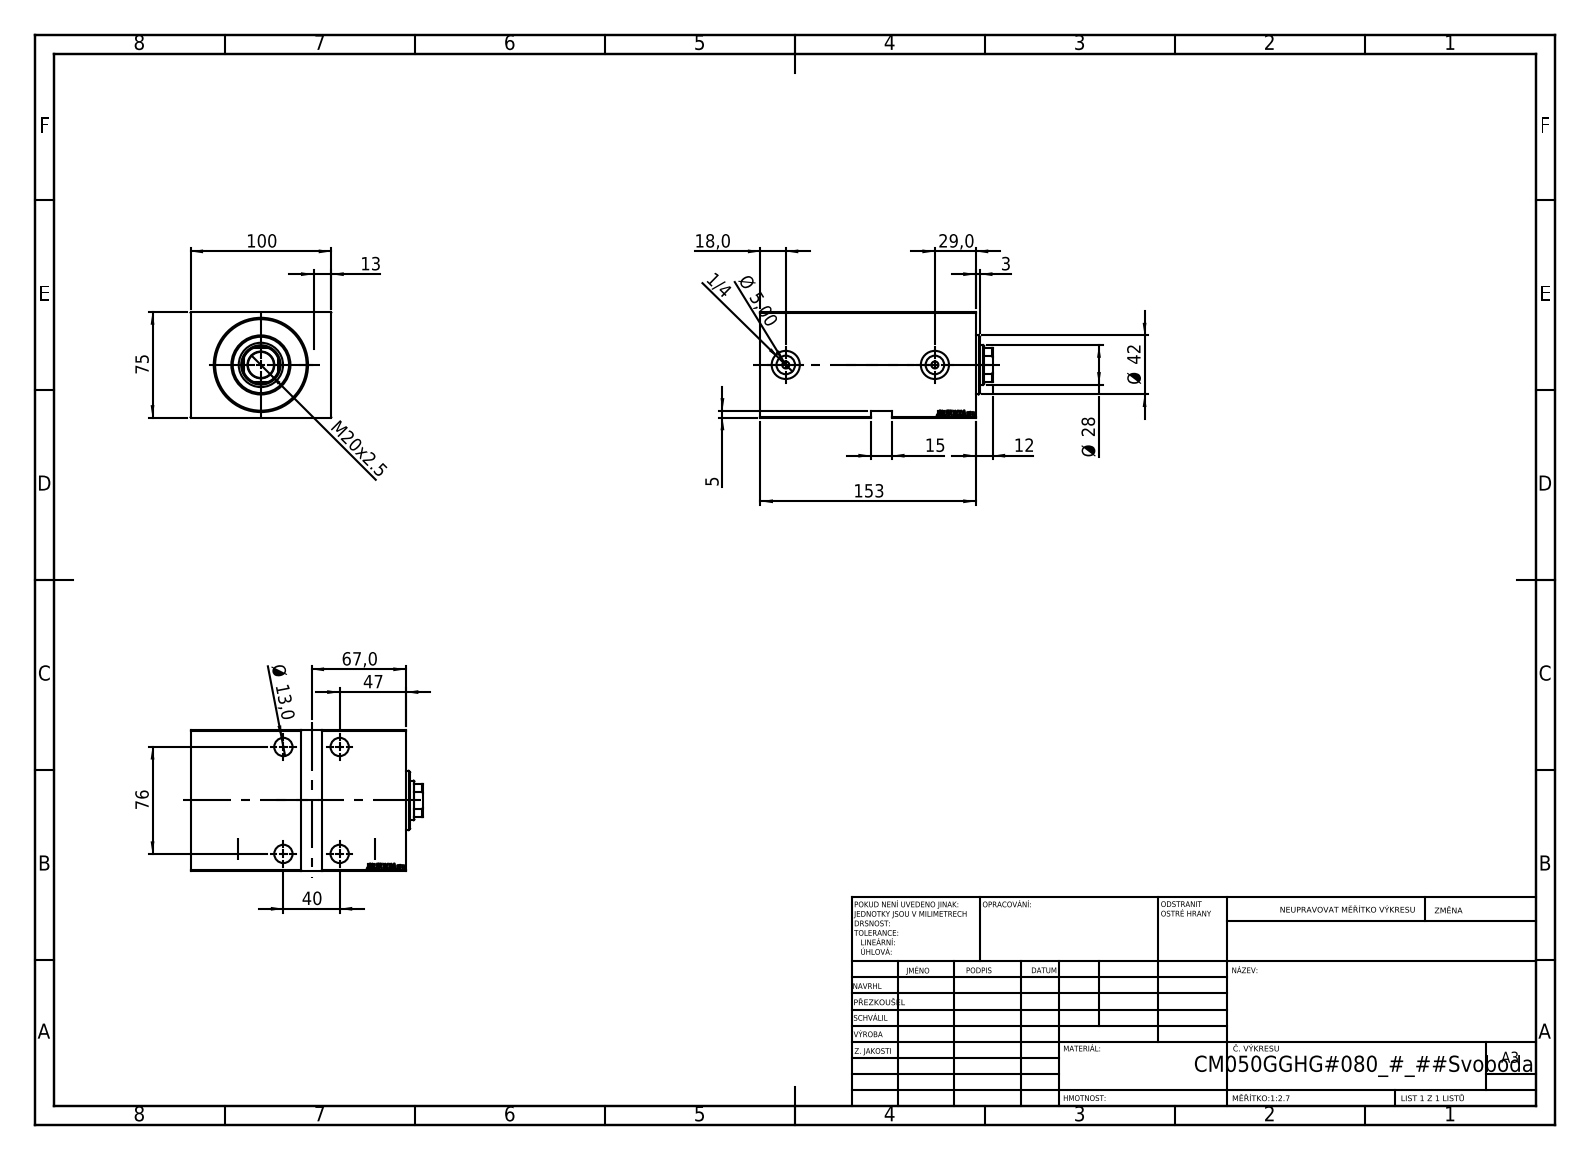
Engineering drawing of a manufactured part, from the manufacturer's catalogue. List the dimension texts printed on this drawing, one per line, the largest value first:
153
100
76
75
67,0
47
Ø 42
40
29,0
Ø 28
M20x2.5
18,0
15
13
Ø 13,0
12
Ø 5,00
5
3
1/4
